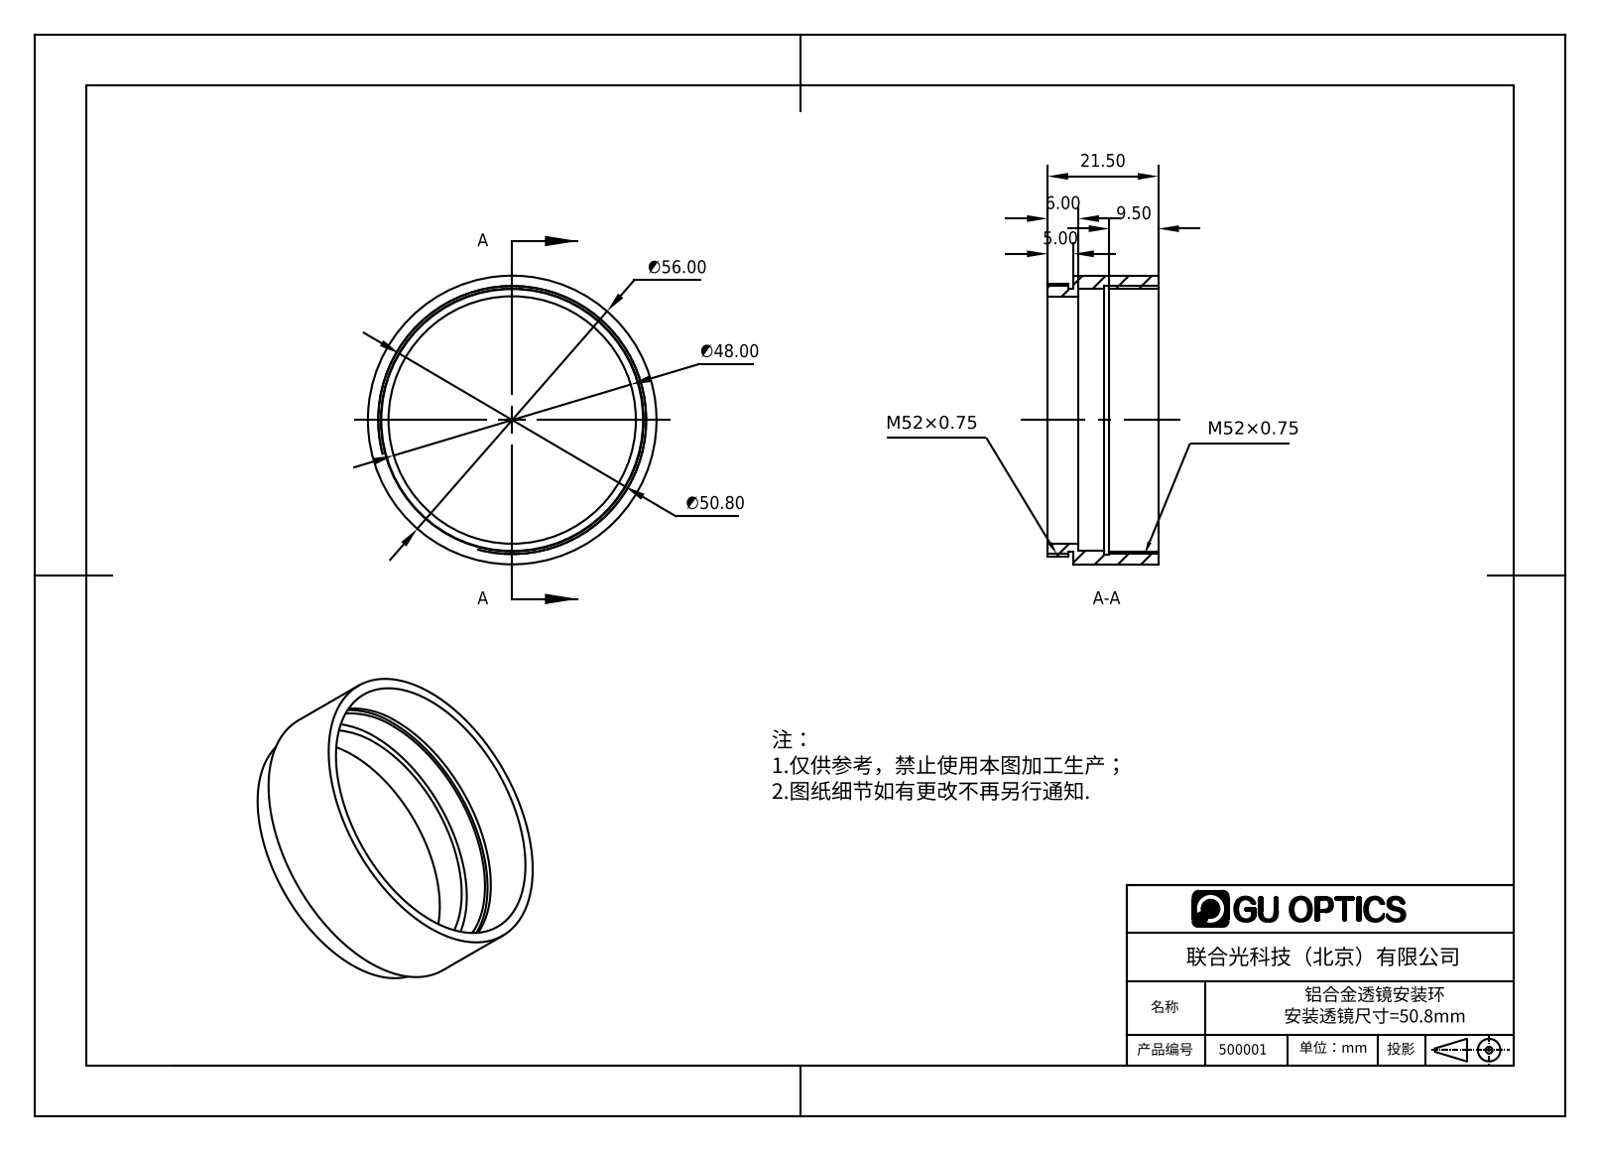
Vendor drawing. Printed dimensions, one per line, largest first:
∅56.00
∅50.80
∅48.00
21.50
9.50
6.00
5.00
